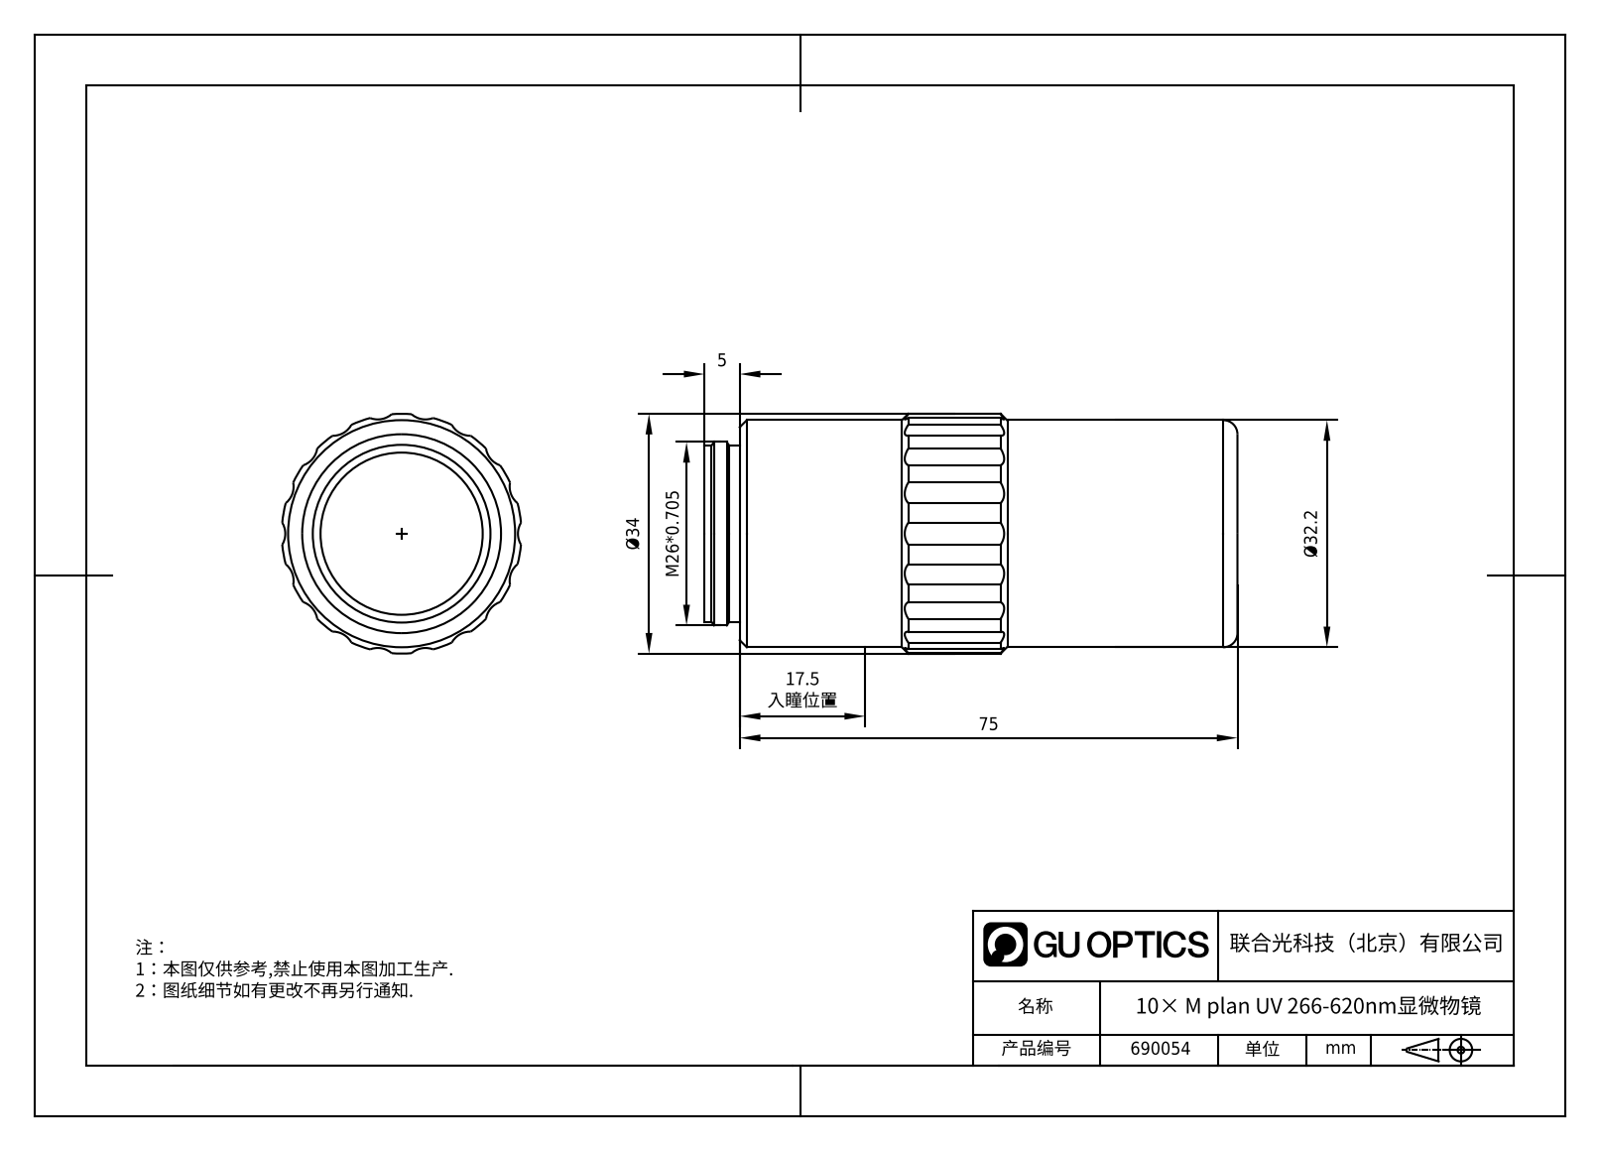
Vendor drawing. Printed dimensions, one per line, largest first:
75
Ø34
Ø32.2
M26*0.705
17.5 入瞳位置
5
